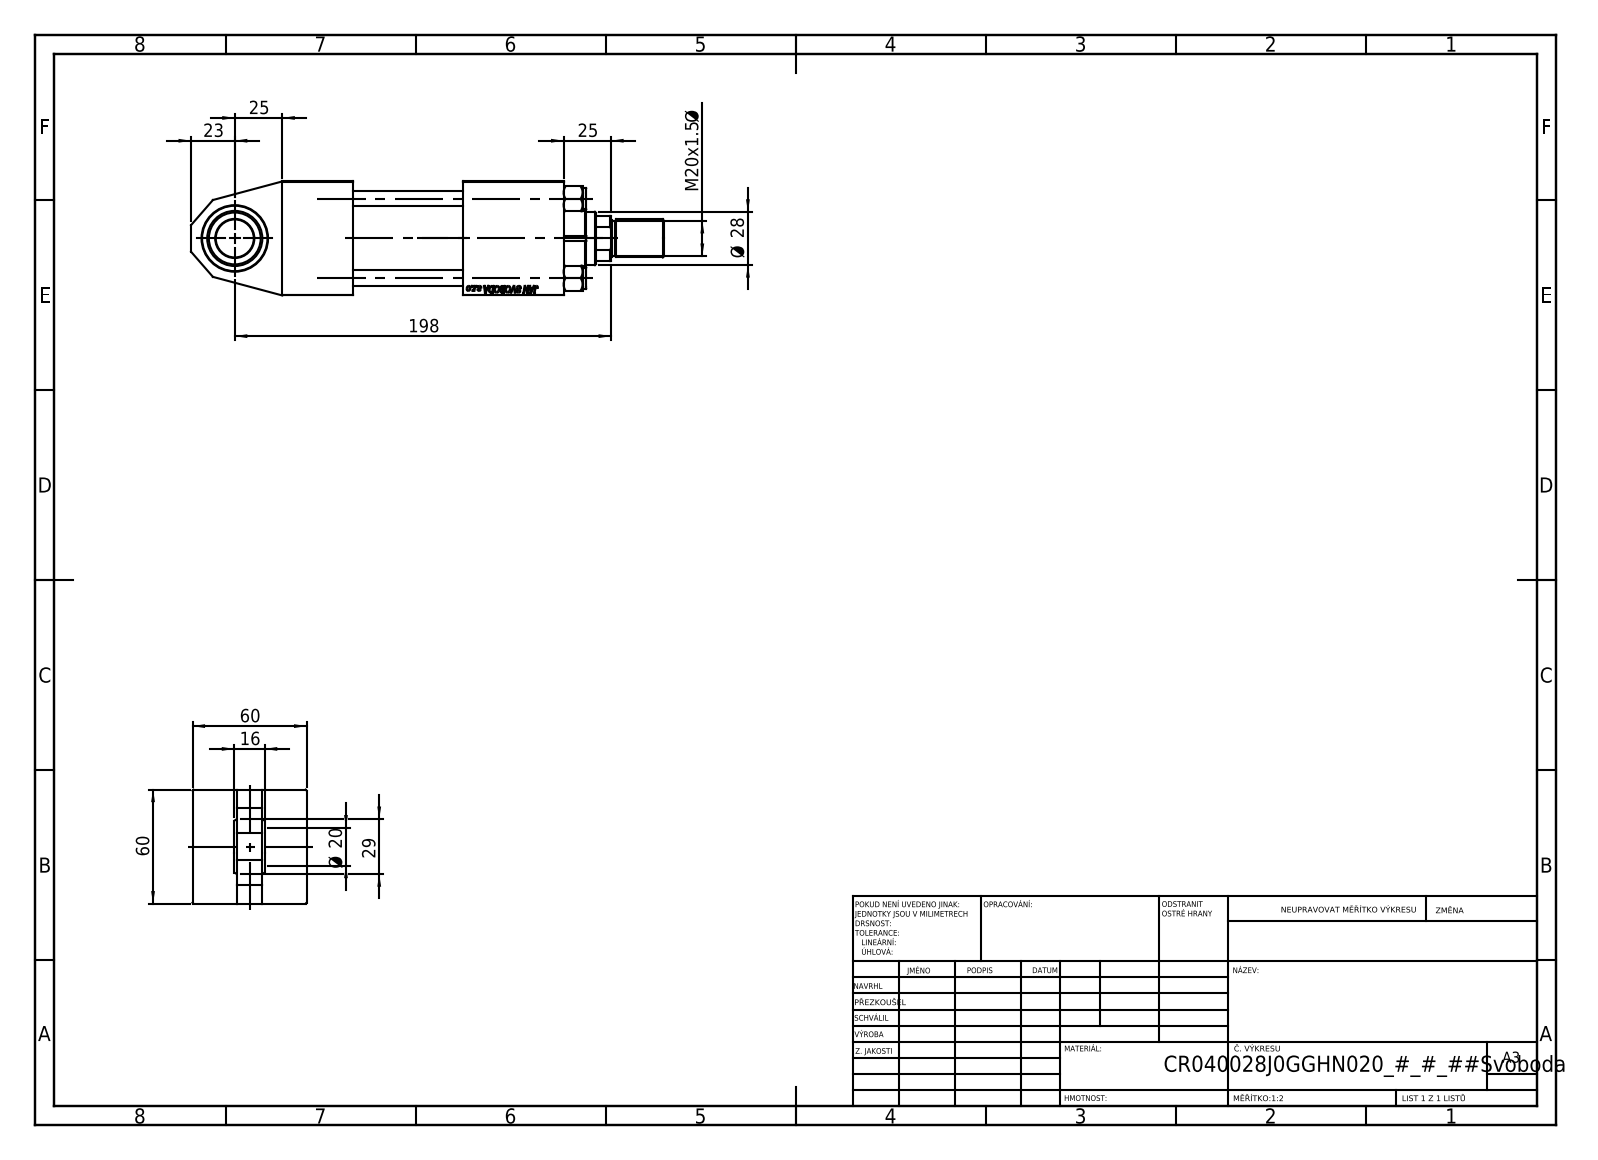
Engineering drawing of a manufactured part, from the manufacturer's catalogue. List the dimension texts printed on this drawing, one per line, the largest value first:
198
60
60
29
Ø 28
25
25
23
M20x1.5 Ø
Ø 20
16
